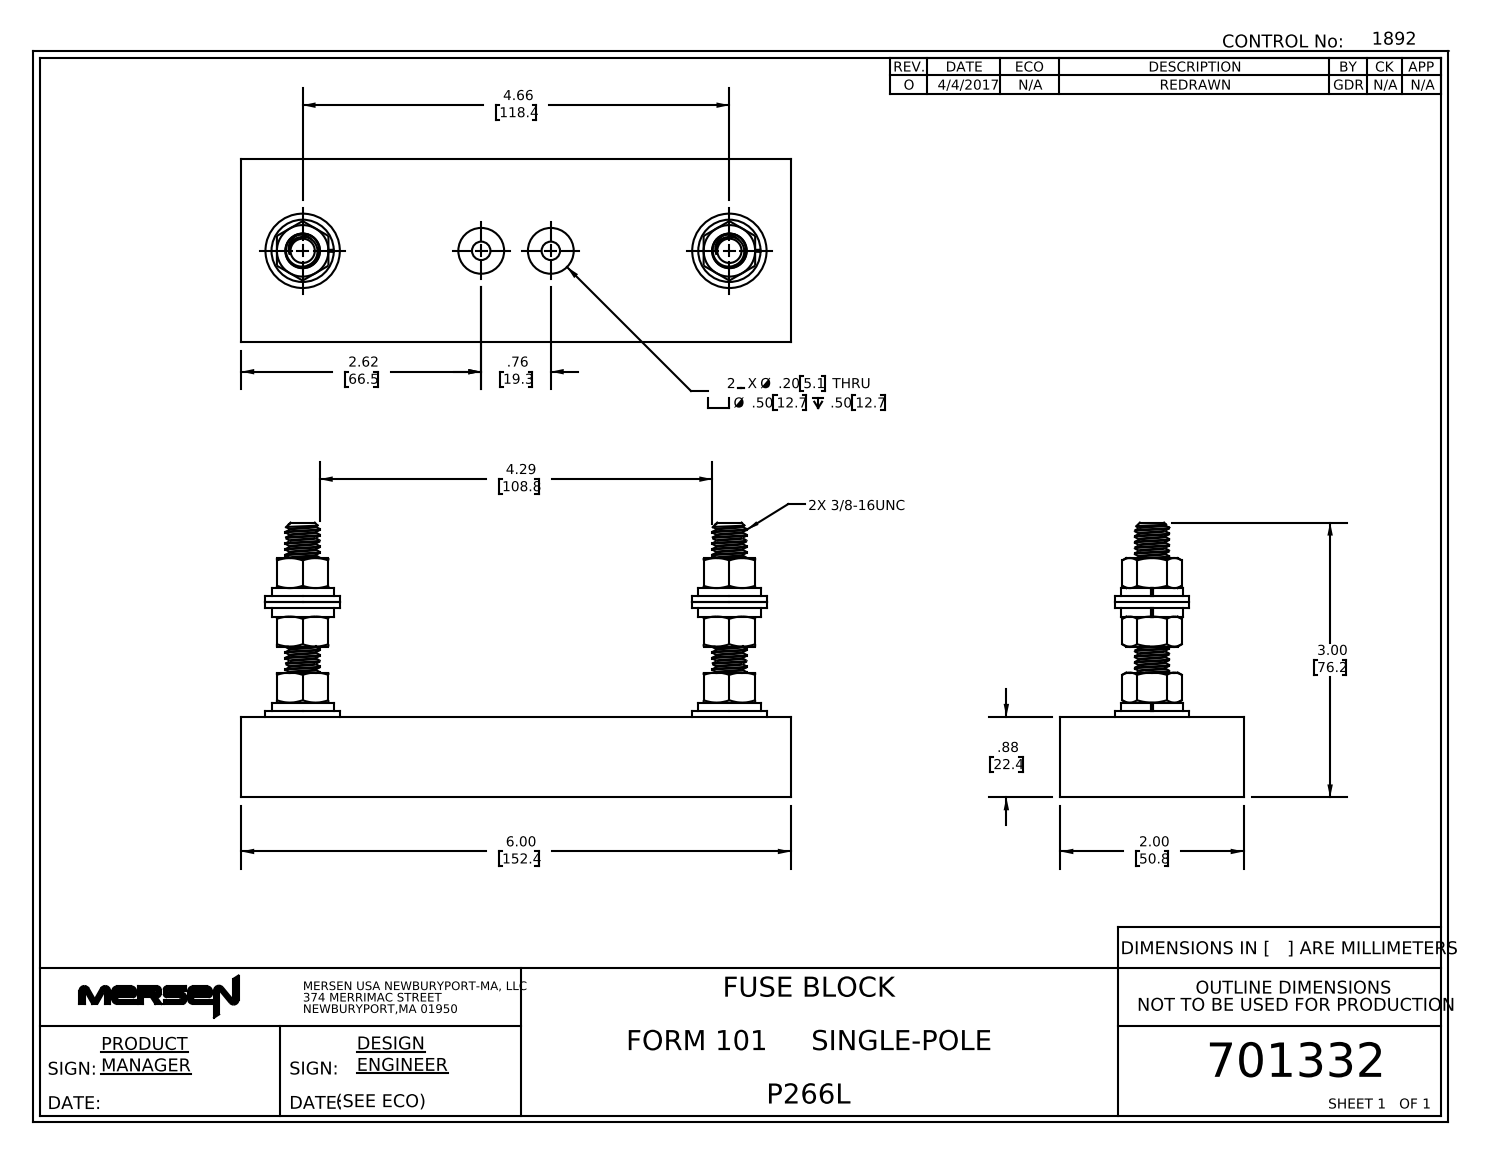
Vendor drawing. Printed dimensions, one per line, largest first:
6.00 152.4
4.66 118.4
4.29 108.8
3.00 76.2
2.62 66.5
2.00 50.8
.88 22.4
.76 19.3
2 X Ø .20 5.1 THRU Ø .50 12.7 .50 12.7
